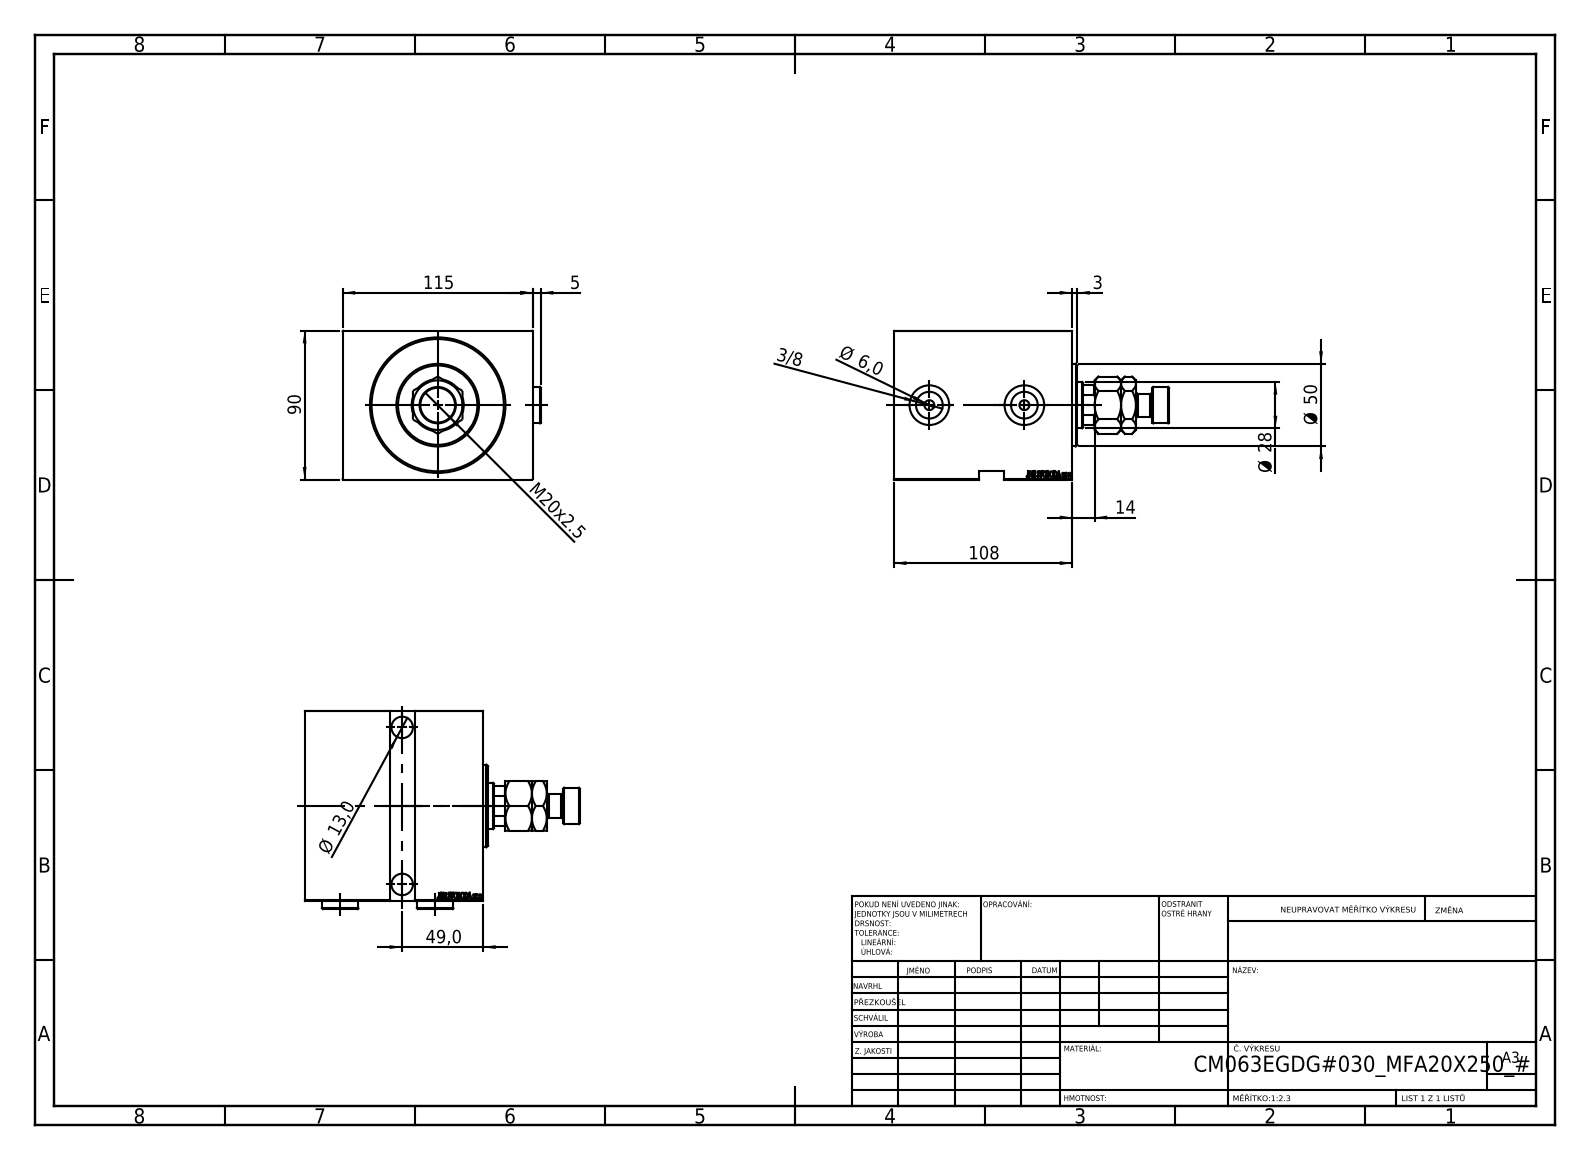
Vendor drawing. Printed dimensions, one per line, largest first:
115
108
90
Ø 50
49,0
Ø 28
M20x2.5
14
Ø 13,0
Ø 6,0
5
3
3/8
